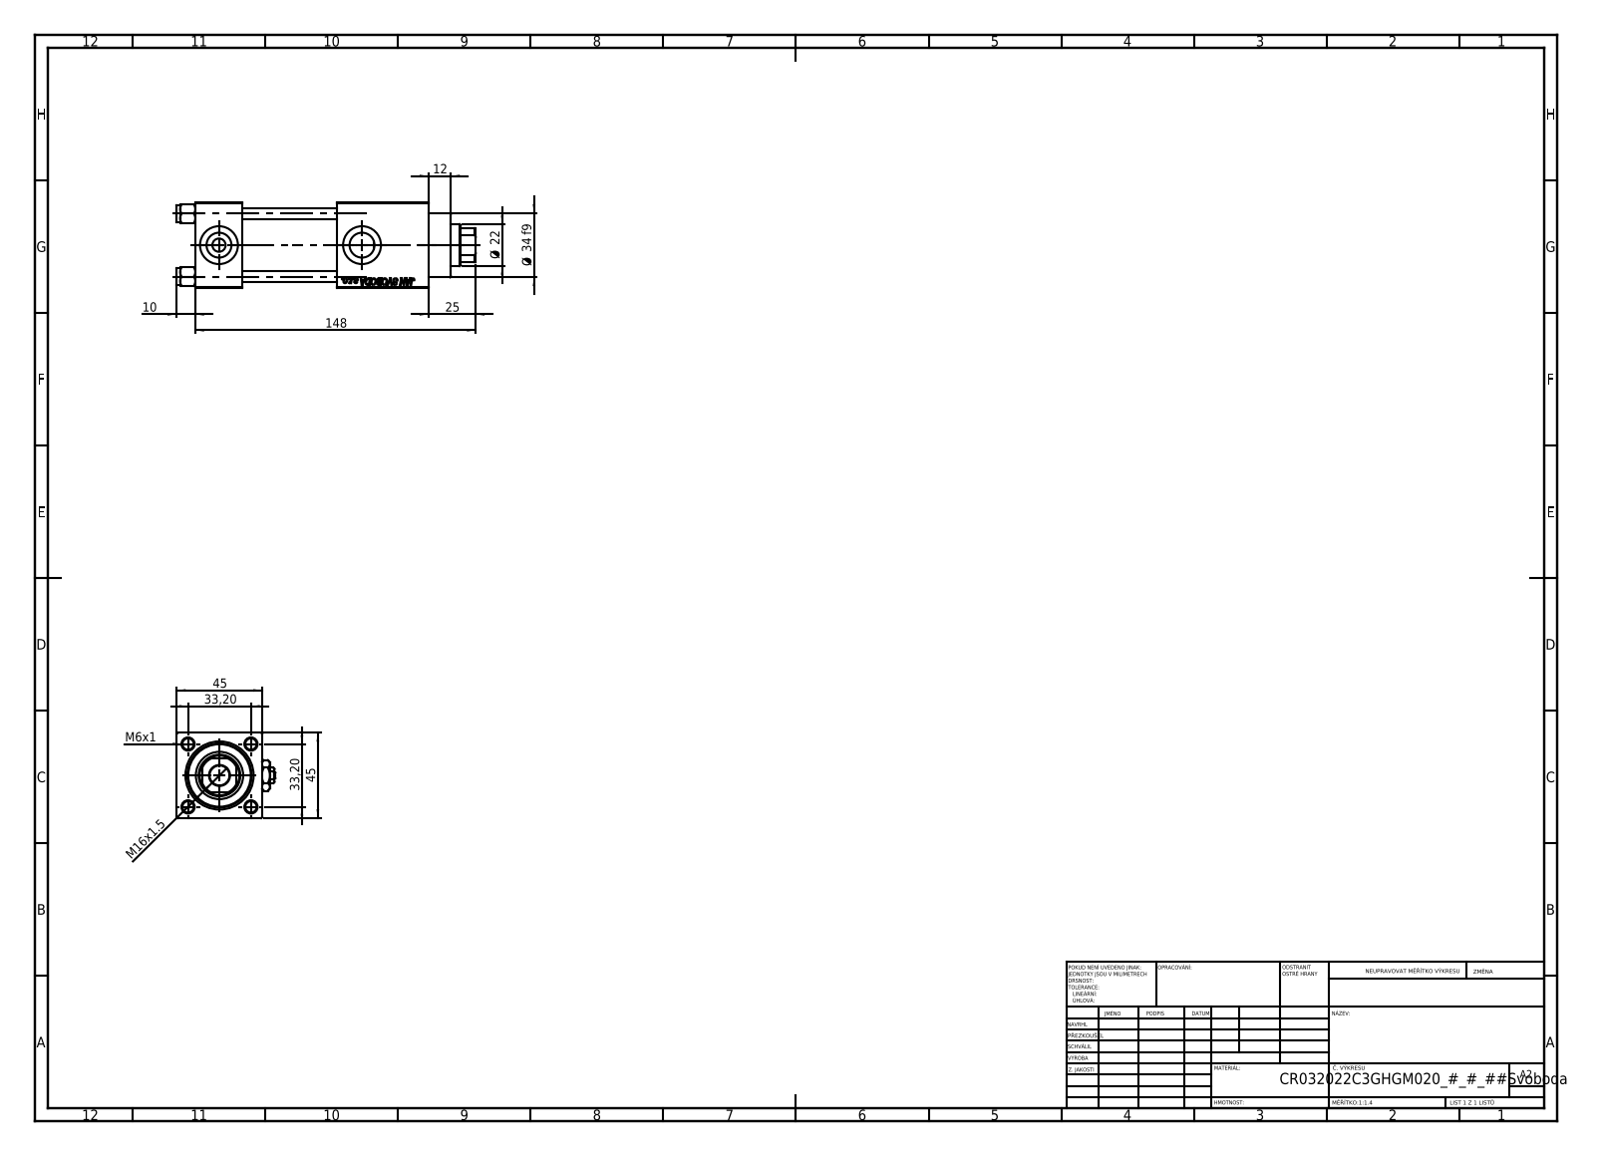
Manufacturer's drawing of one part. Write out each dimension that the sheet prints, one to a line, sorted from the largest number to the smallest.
148
45
45
Ø 34 f9
33,20
33,20
25
Ø 22
M16x1.5
12
10
M6x1
